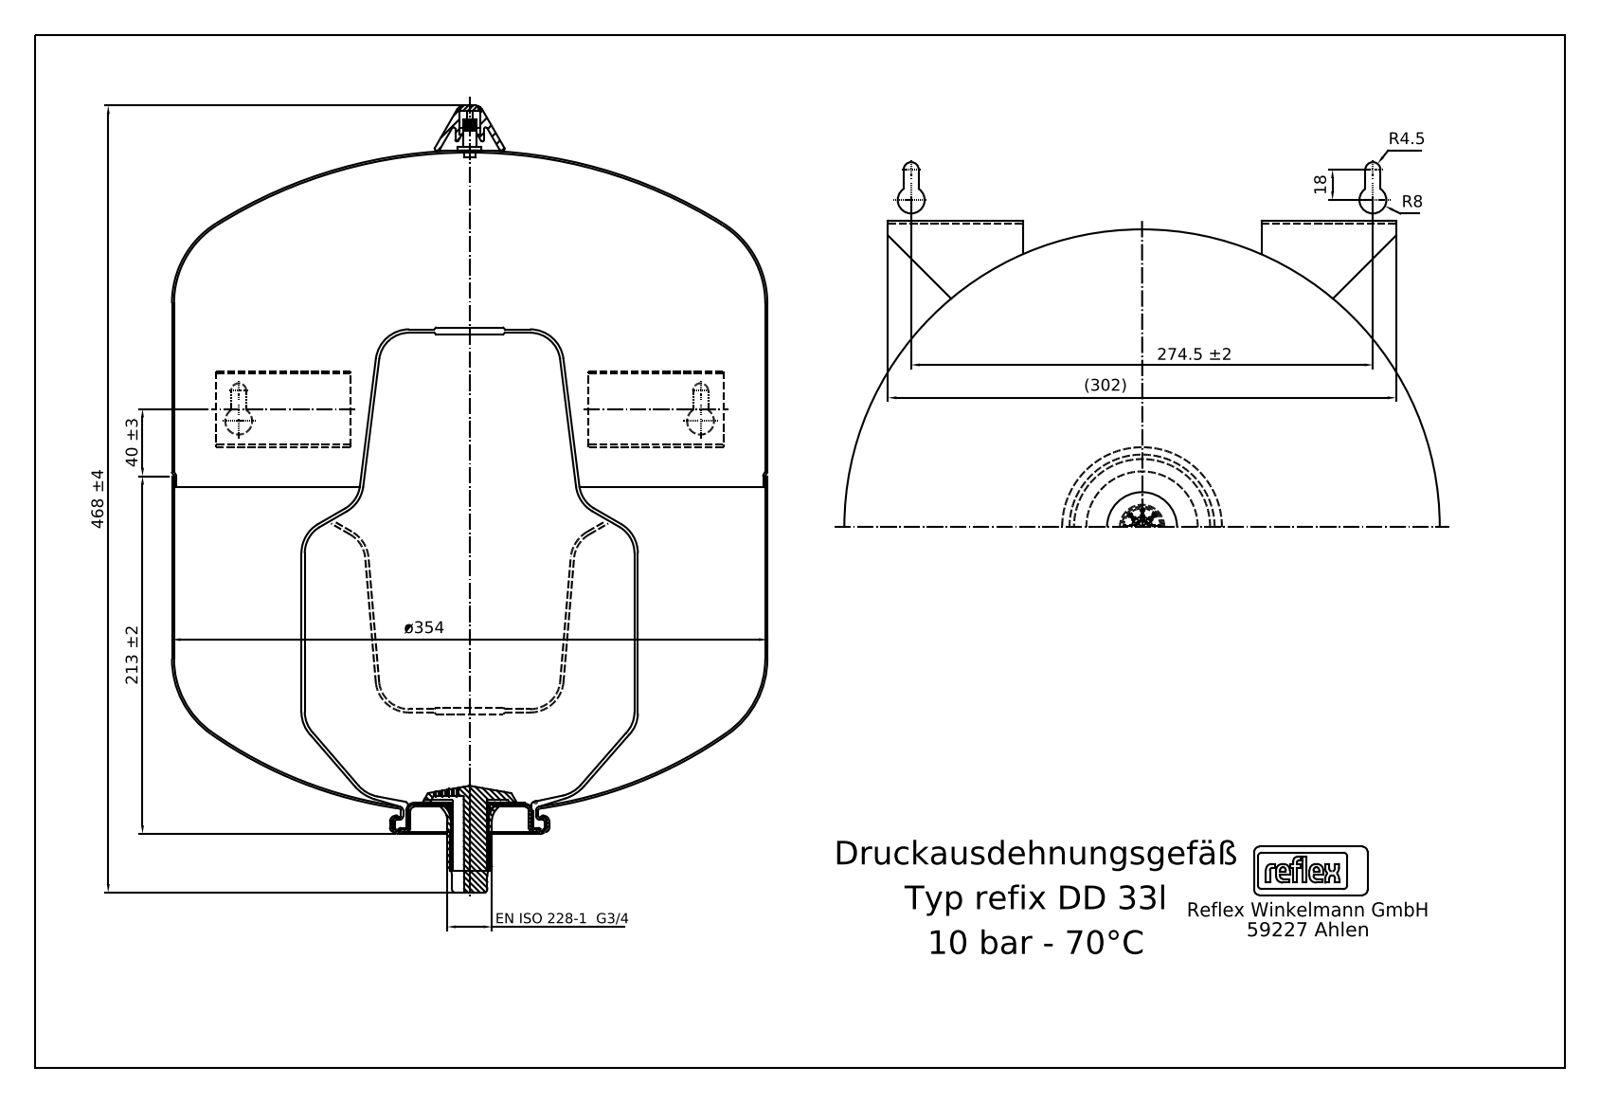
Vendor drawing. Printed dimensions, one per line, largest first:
468 ±4
ø354
(302)
274.5 ±2
EN ISO 228-1 G3/4
213 ±2
40 ±3
18
R8
R4.5
